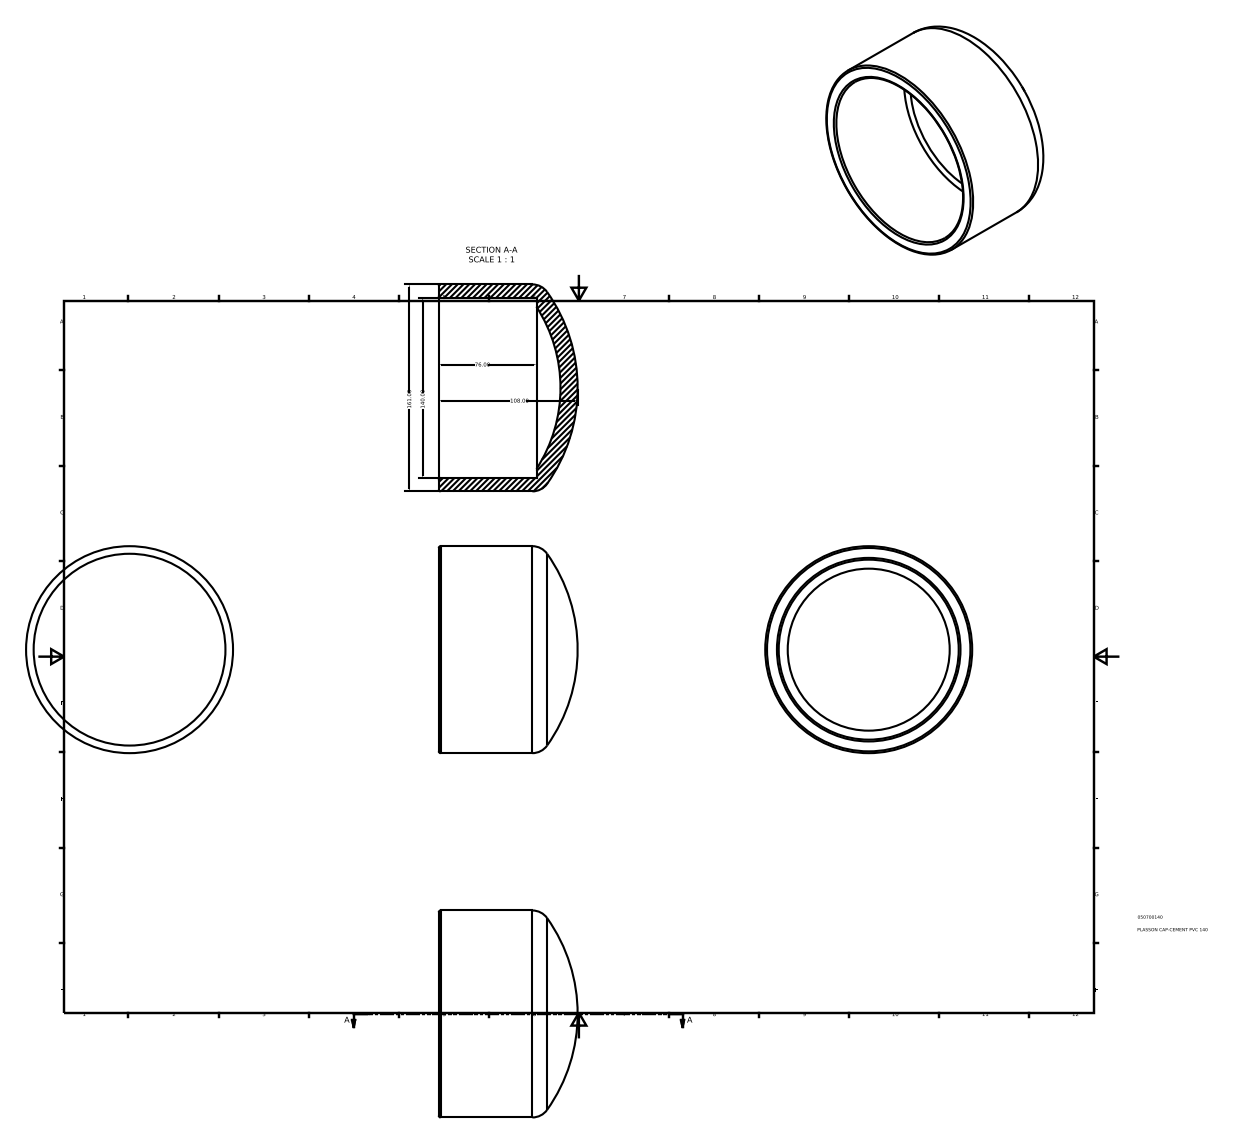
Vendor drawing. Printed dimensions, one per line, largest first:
161.00
140.00
108.00
76.00
